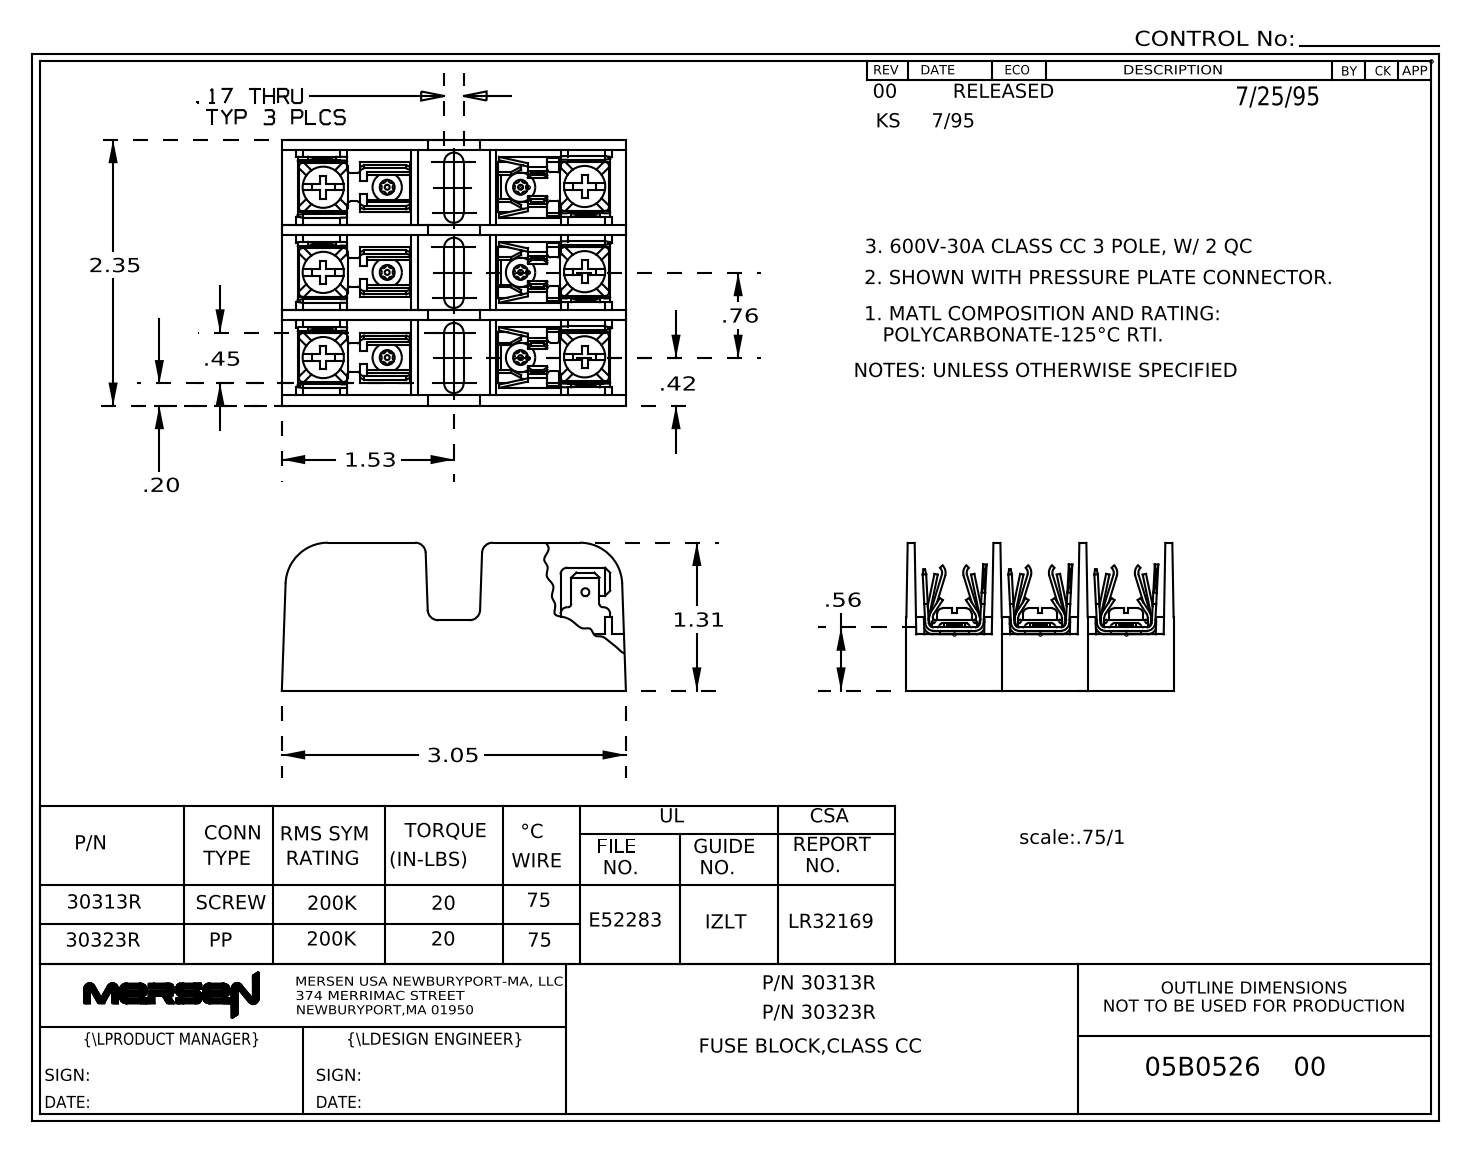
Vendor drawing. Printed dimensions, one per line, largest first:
3.05
2.35
1.53
1.31
.76
.56
.45
.42
.20
